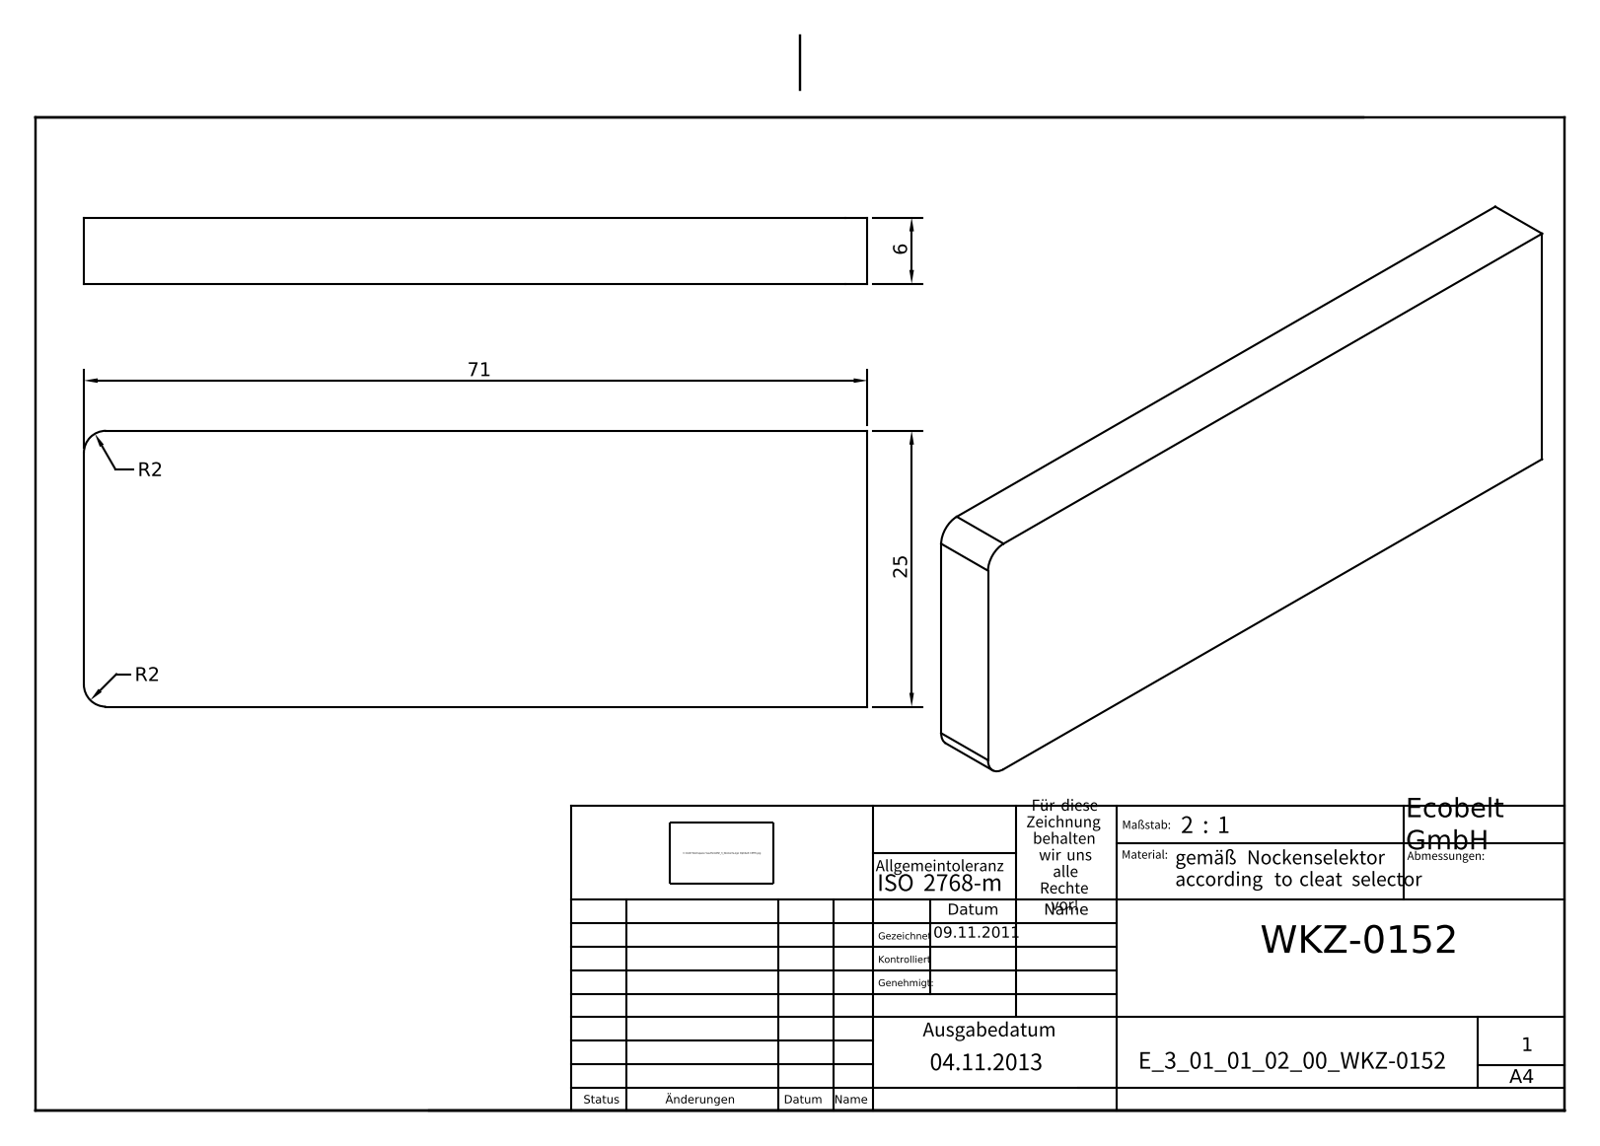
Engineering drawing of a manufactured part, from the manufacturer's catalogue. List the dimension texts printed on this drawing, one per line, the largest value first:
71
25
6
R2
R2
